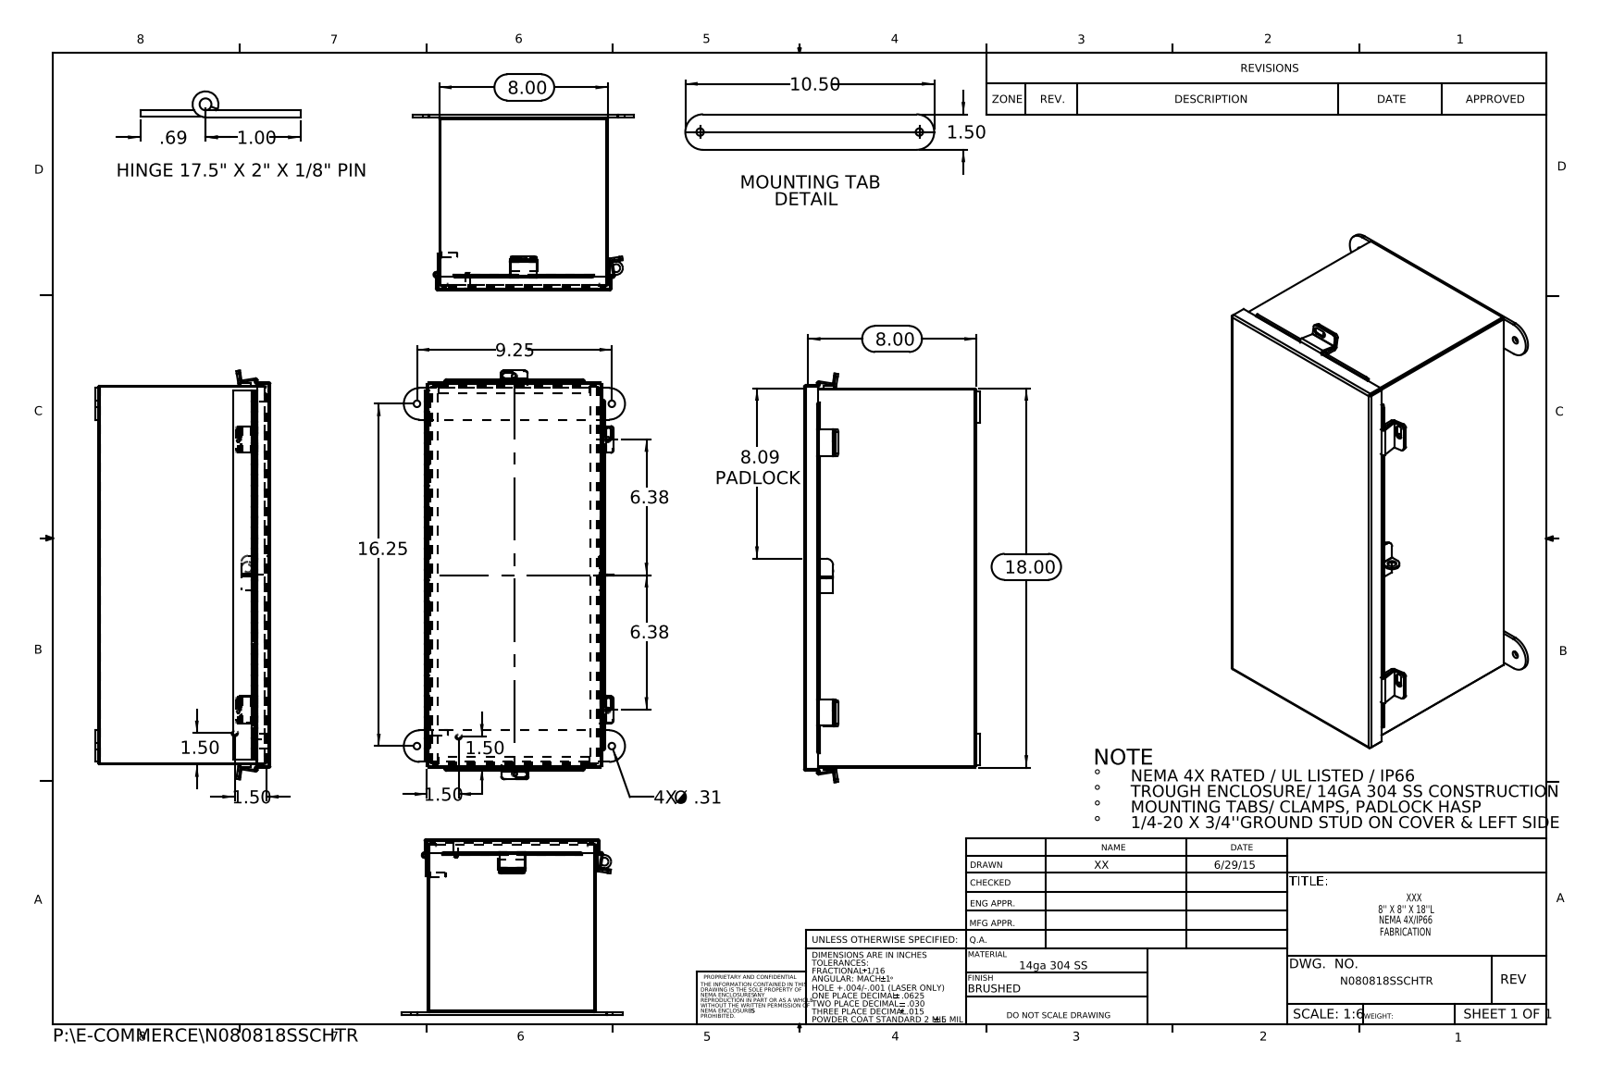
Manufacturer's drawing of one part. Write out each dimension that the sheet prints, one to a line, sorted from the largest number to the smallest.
18.00
16.25
10.50
9.25
8.09 PADLOCK
8.00
8.00
6.38
6.38
1.50
1.50
1.50
1.50
1.50
1.00
.69
4X Ø .31
